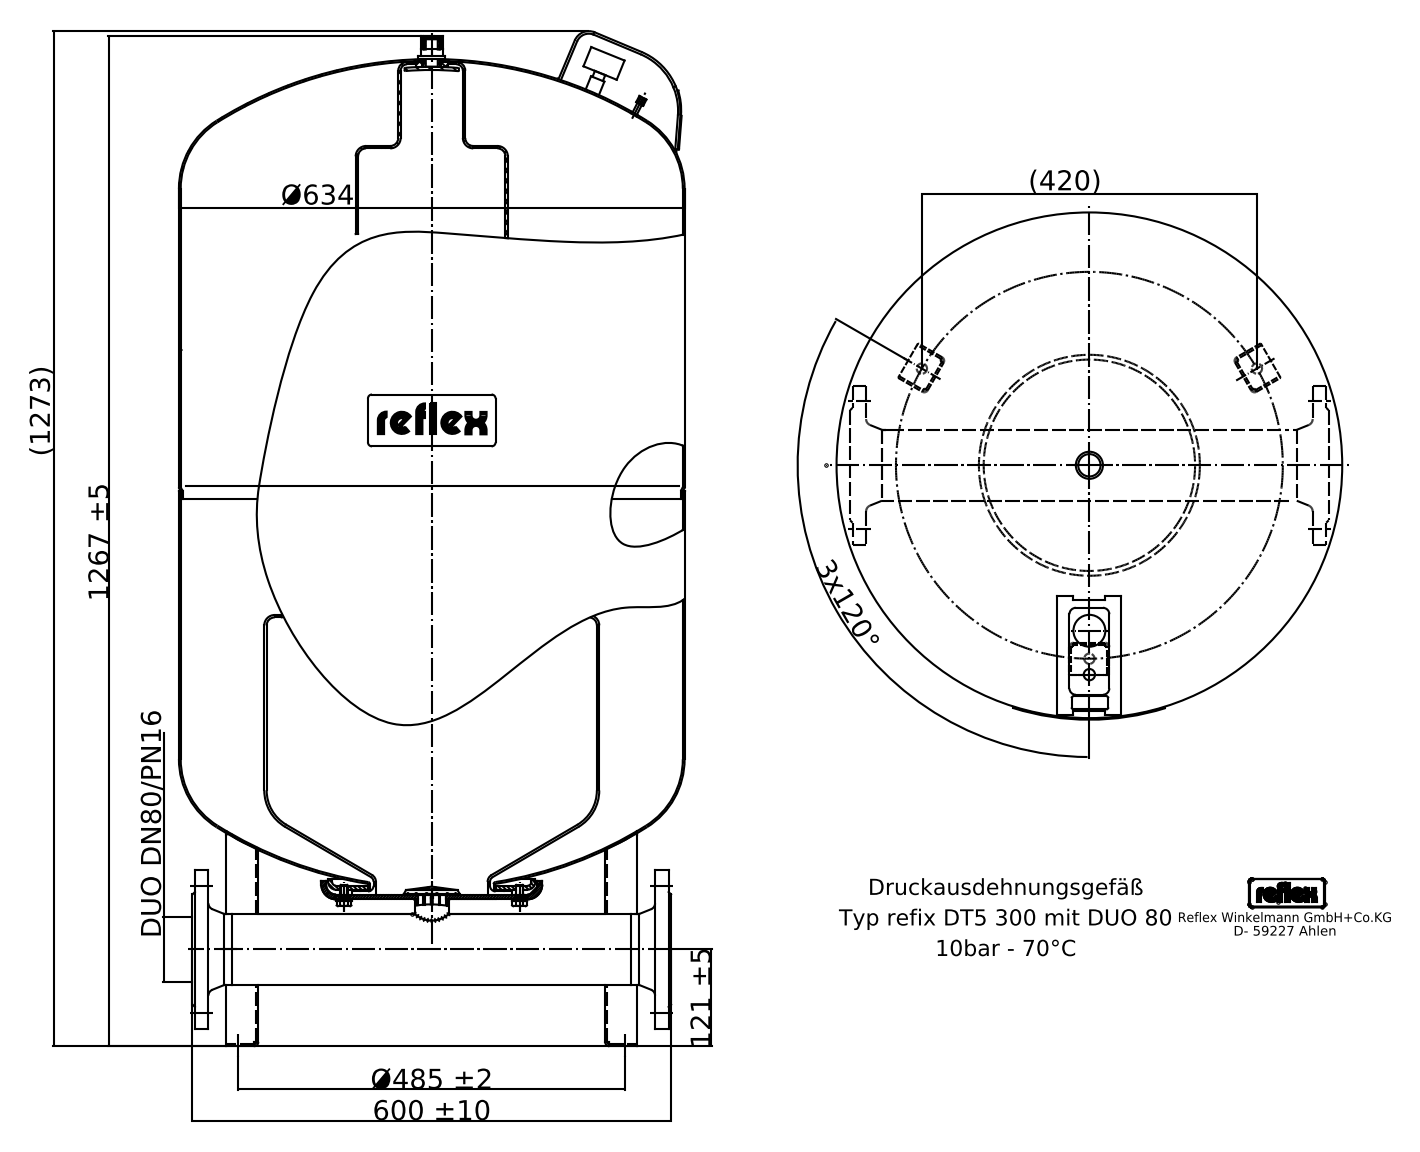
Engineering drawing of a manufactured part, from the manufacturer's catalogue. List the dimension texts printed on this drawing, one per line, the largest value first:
(1273)
1267 ±5
Ø634
600 ±10
Ø485 ±2
(420)
121 ±5
3x120°
DUO DN80/PN16
